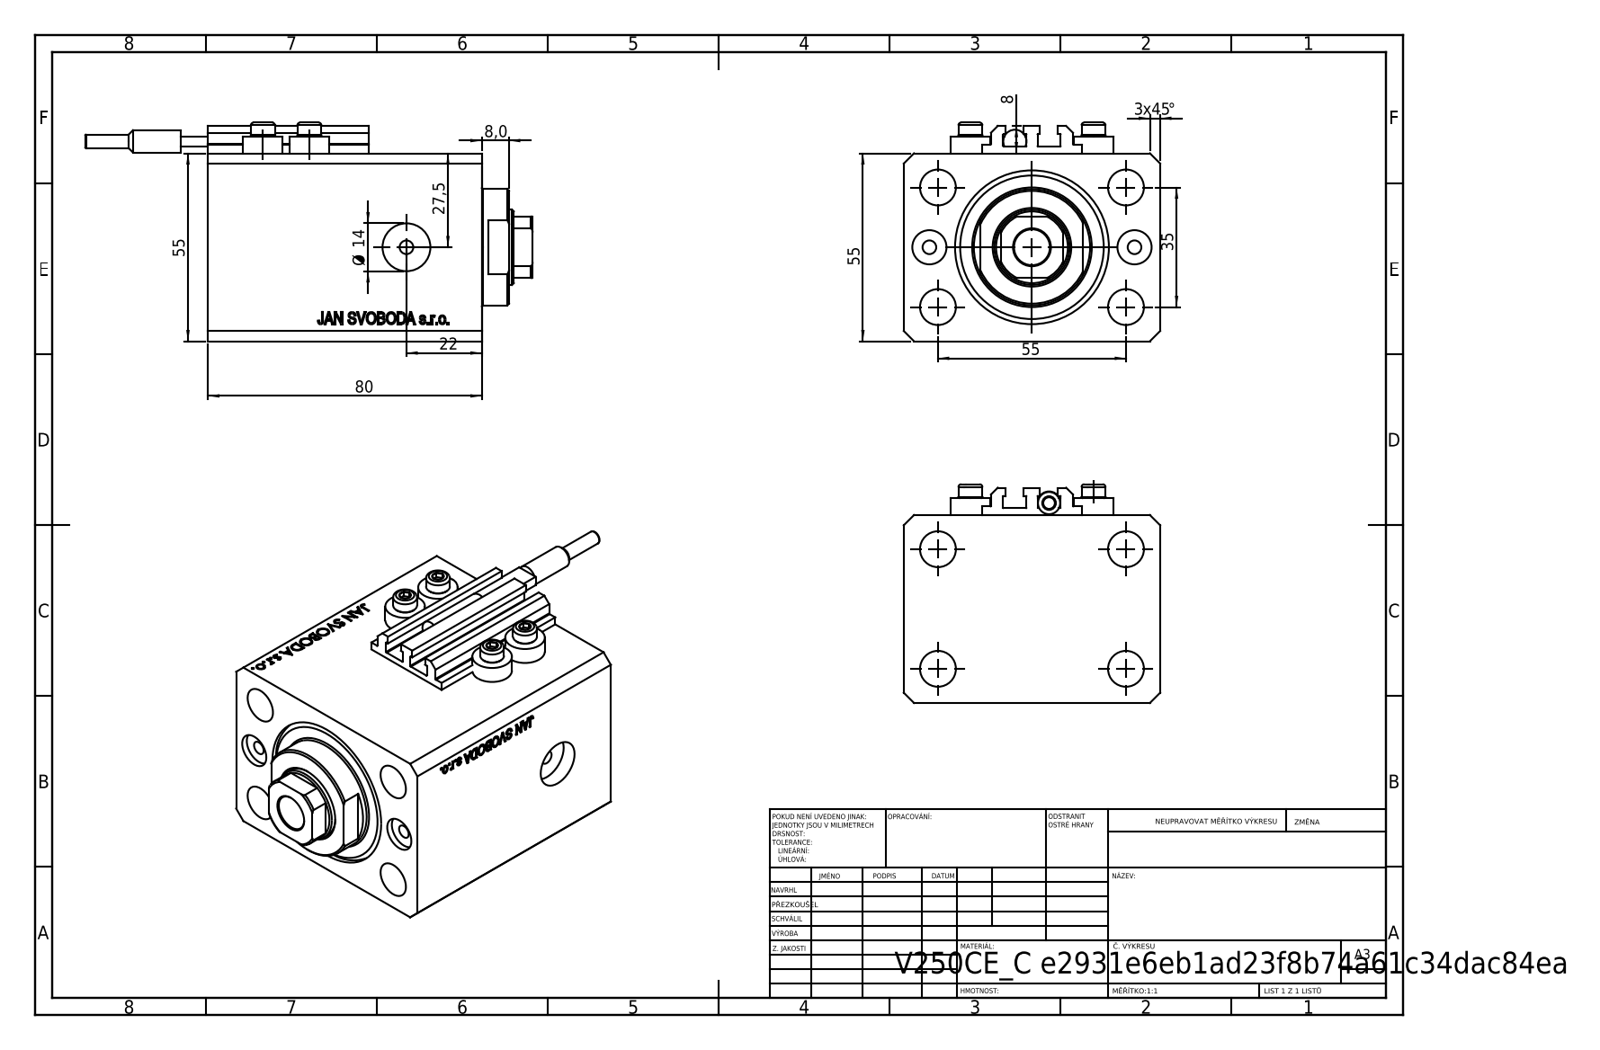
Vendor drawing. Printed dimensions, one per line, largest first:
80
55
55
55
3 x45 °
35
27,5
22
Ø 14
8
8,0
